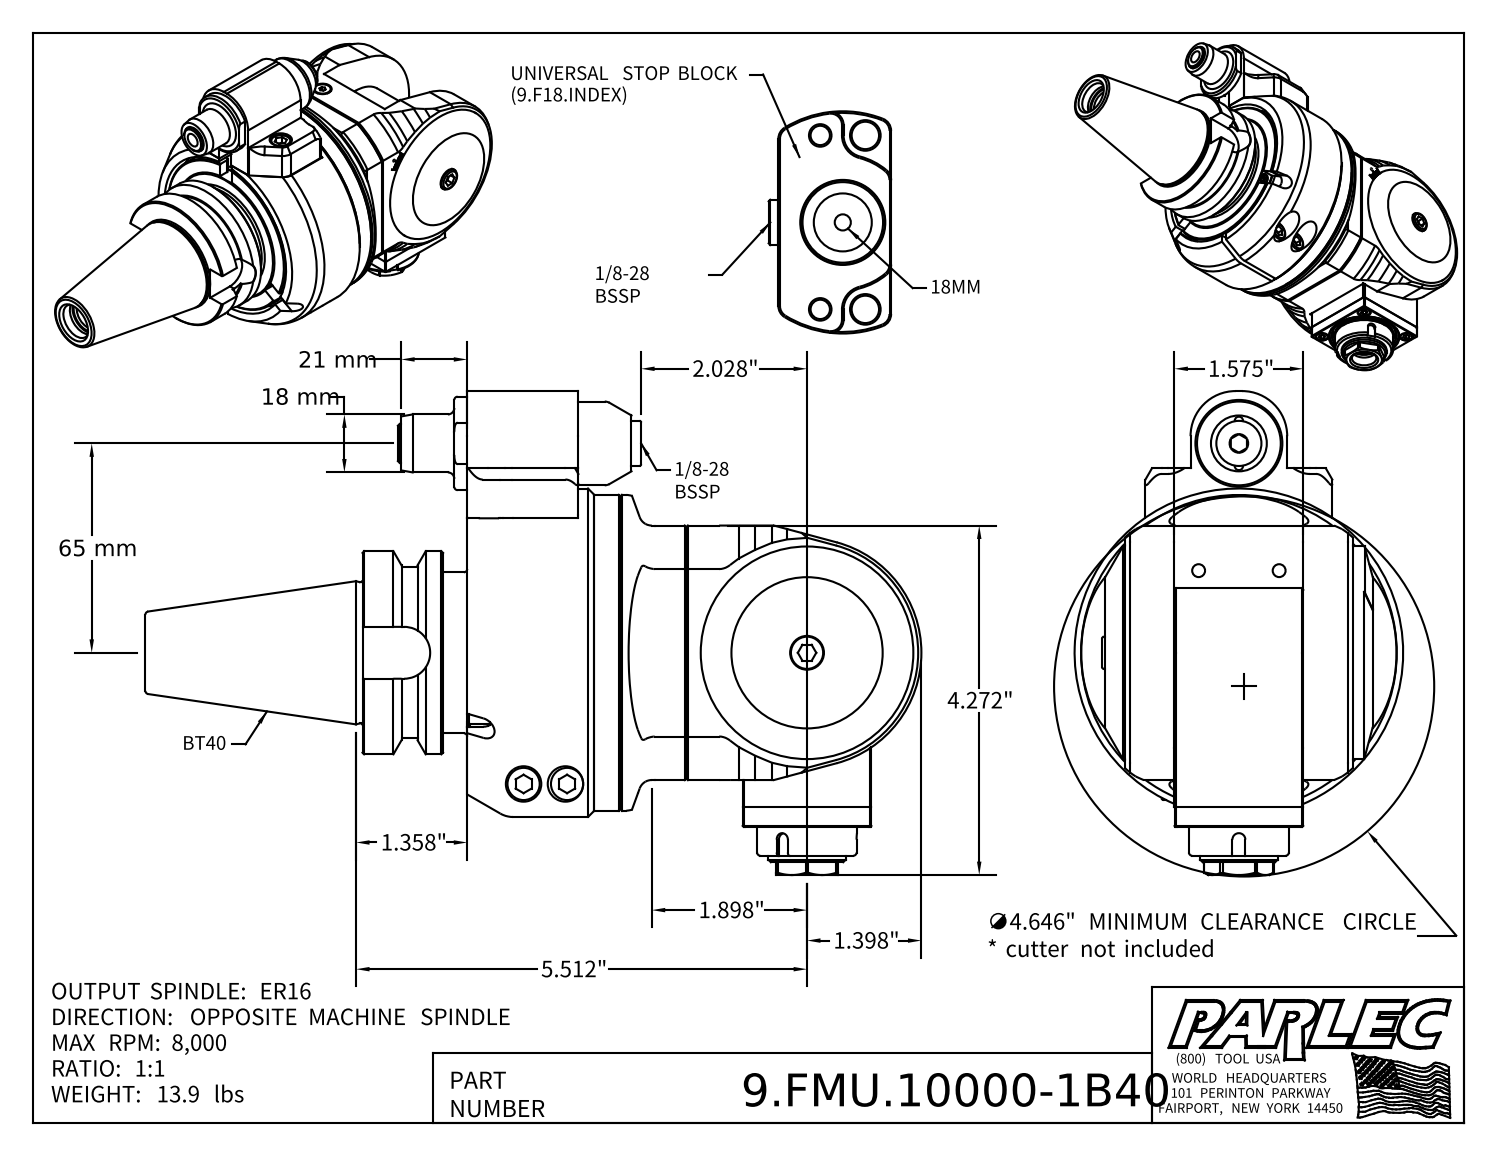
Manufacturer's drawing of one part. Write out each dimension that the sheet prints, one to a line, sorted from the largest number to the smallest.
65 mm
21 mm
18 mm
5.512"
∅4.646" MINIMUM CLEARANCE CIRCLE * cutter not included
4.272"
2.028"
1.898"
1.575"
1.398"
1.358"
